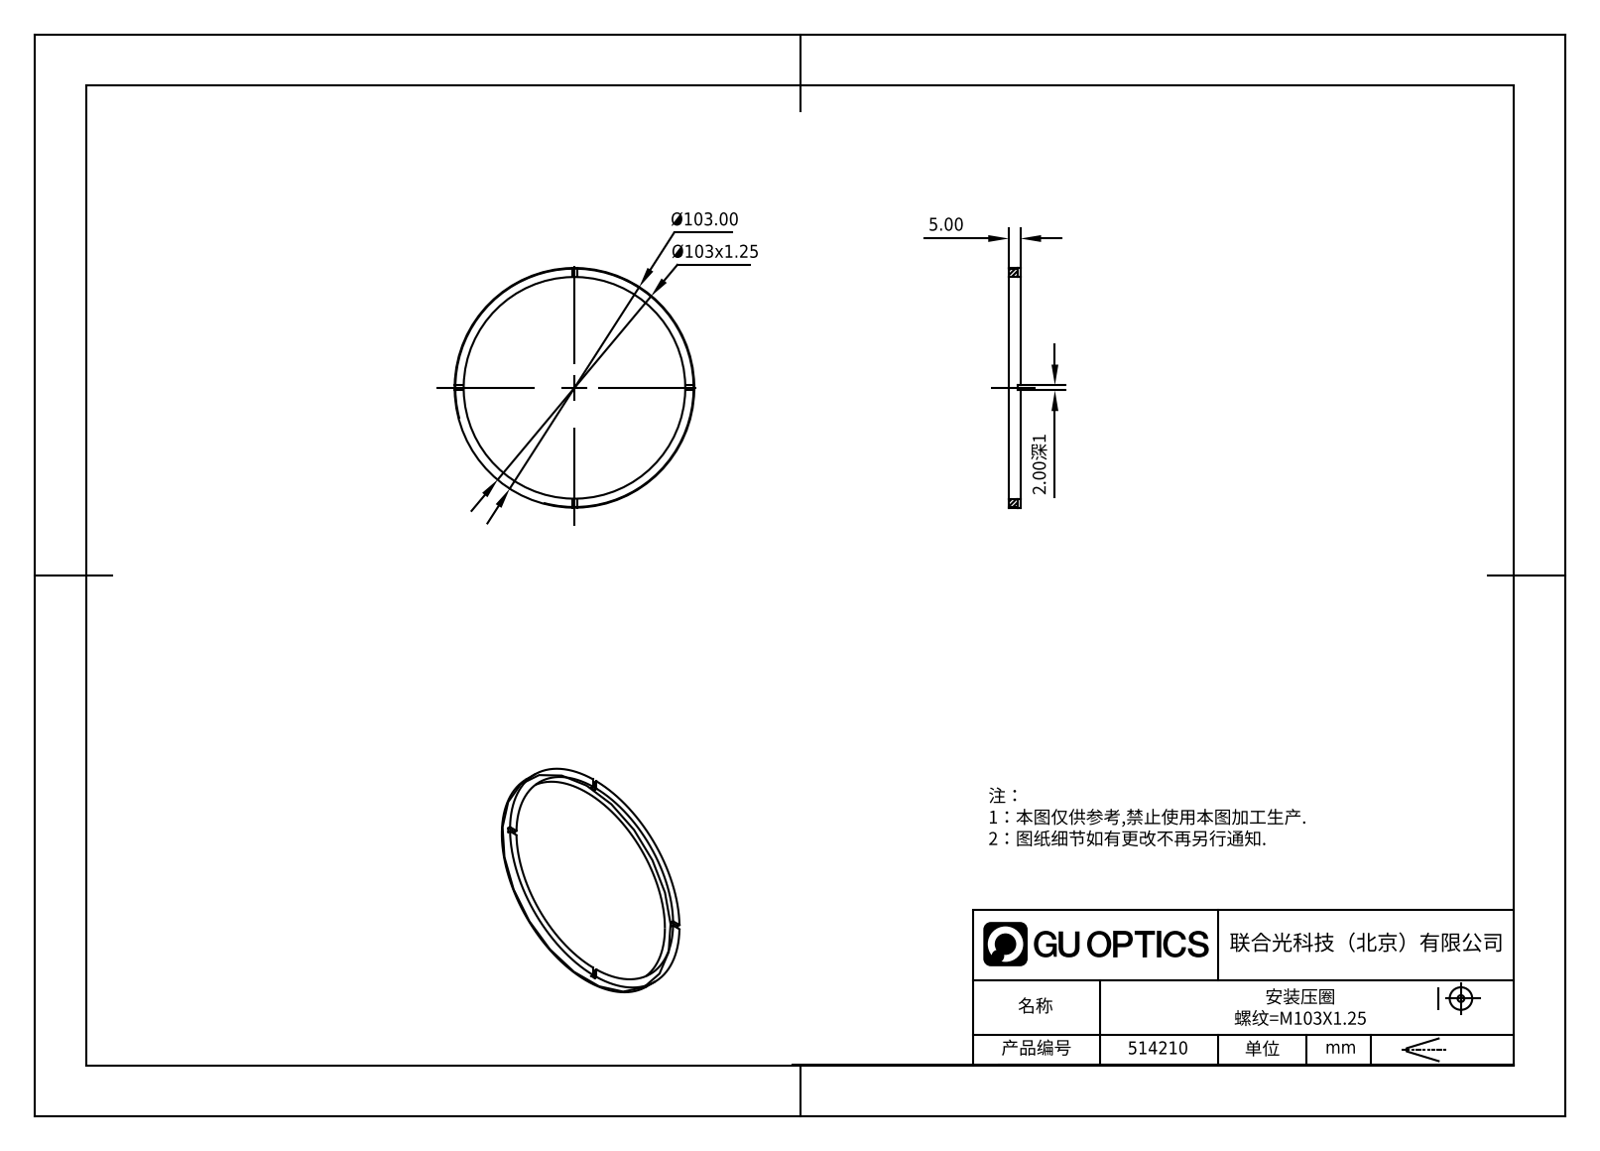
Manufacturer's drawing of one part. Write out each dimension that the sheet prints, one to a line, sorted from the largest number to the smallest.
Ø103.00
Ø103x1.25
5.00
2.00深1
